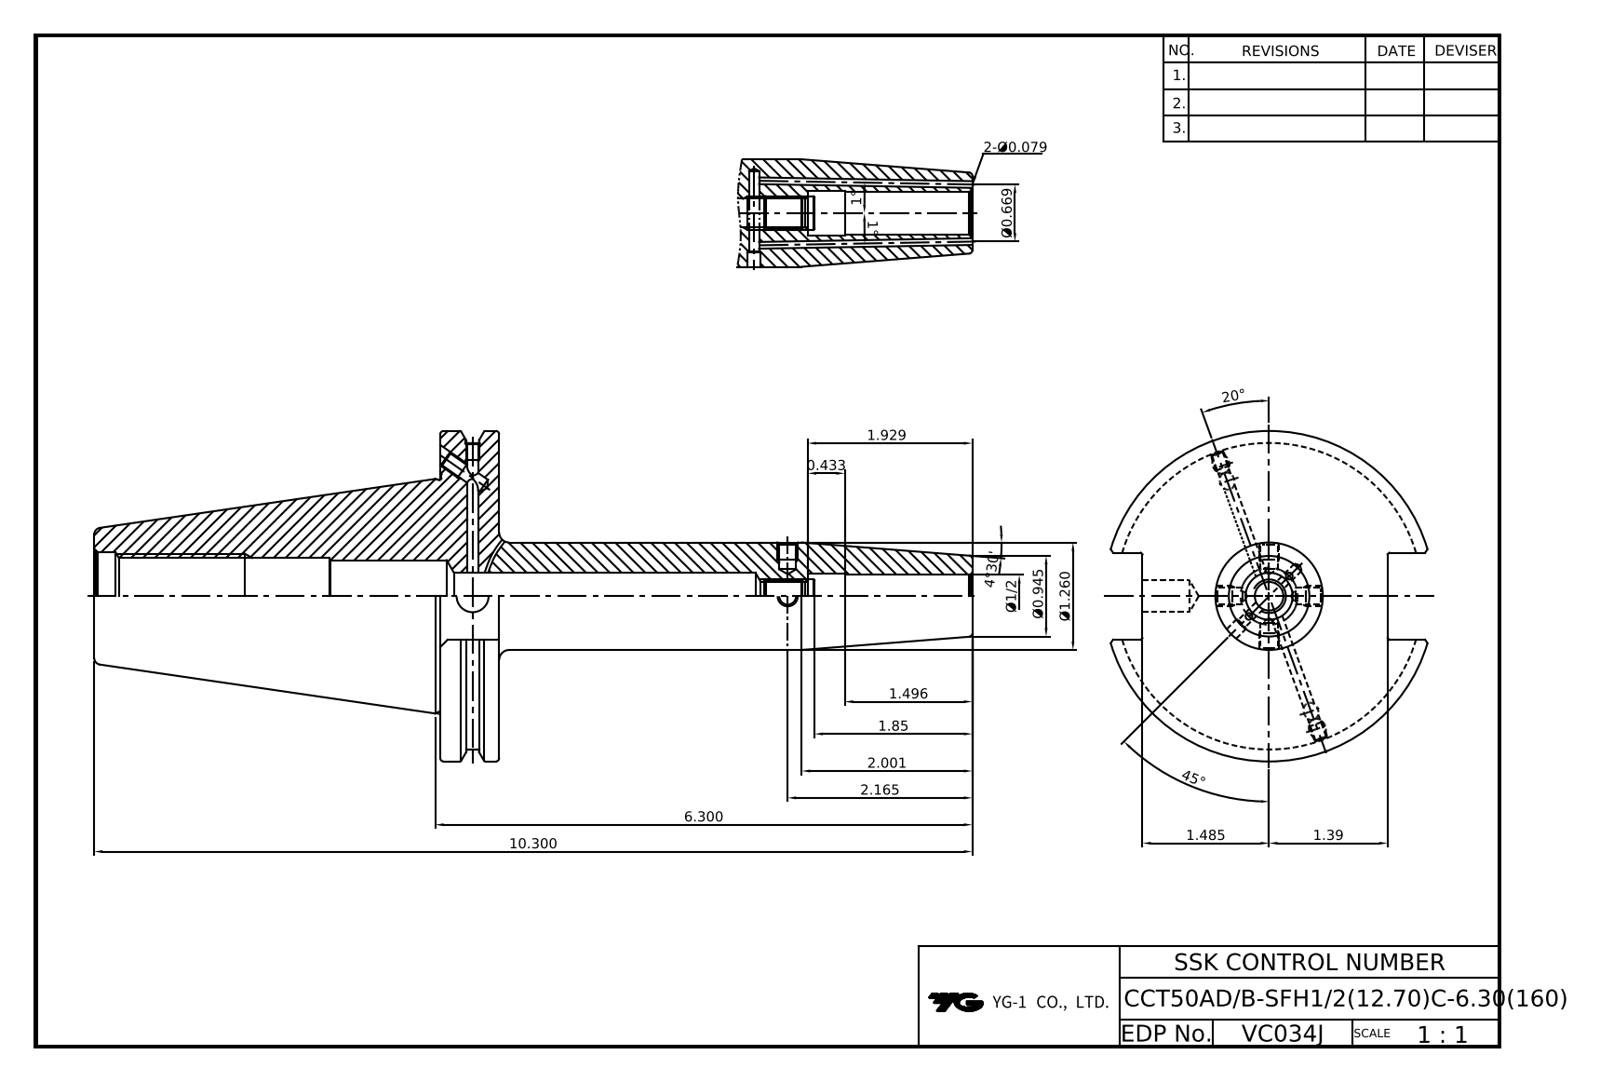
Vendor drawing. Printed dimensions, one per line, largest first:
45°
20°
10.300
6.300
4°30'
2.165
2.001
1.929
1.85
1.496
1.485
1.39
Ø1.260
1°
1°
Ø0.945
Ø0.669
0.433
